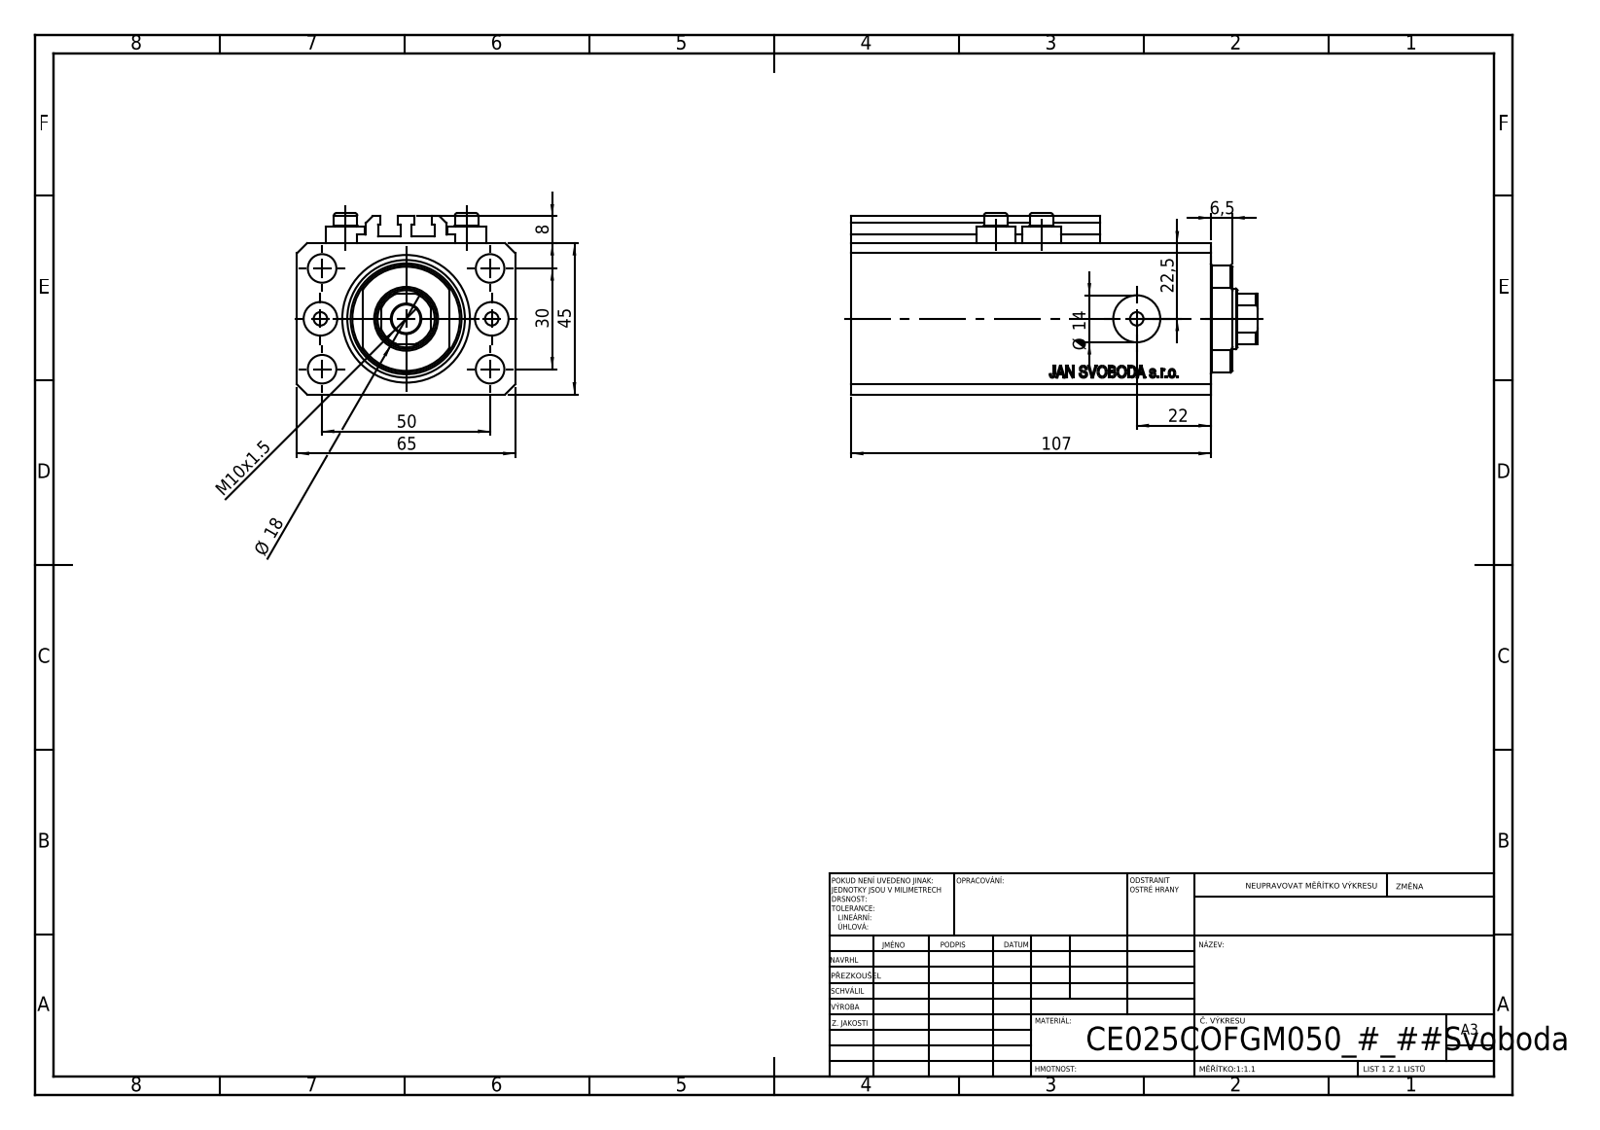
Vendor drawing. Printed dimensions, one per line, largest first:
107
65
50
45
30
22,5
22
Ø 18
Ø 14
M10x1.5
8
6,5
